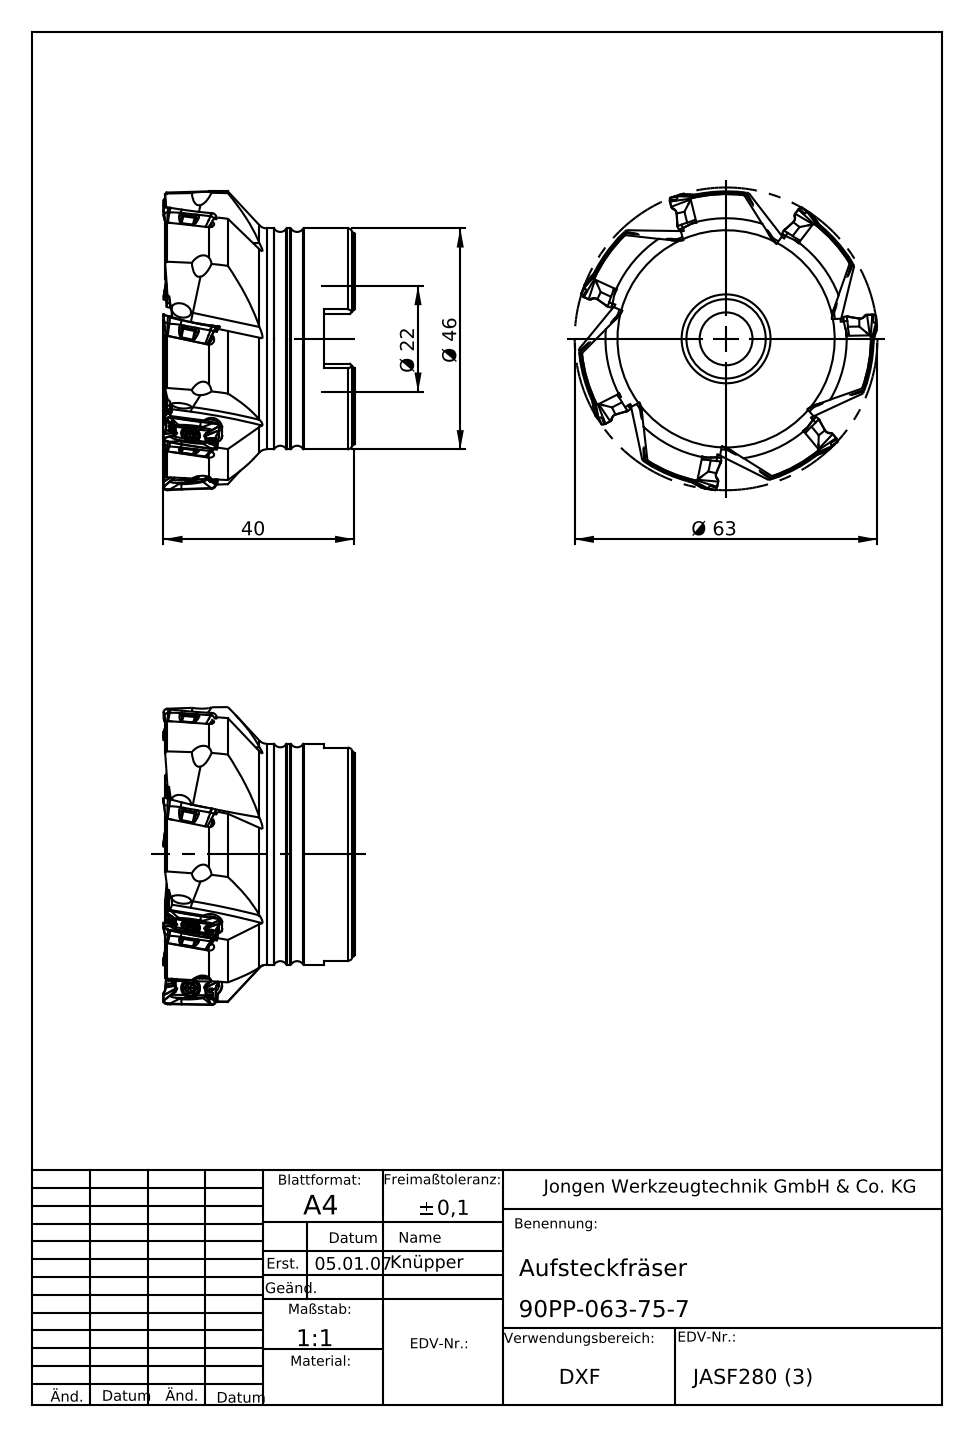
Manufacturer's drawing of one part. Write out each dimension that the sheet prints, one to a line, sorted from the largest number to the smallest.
Ø 63
Ø 46
40
Ø 22
